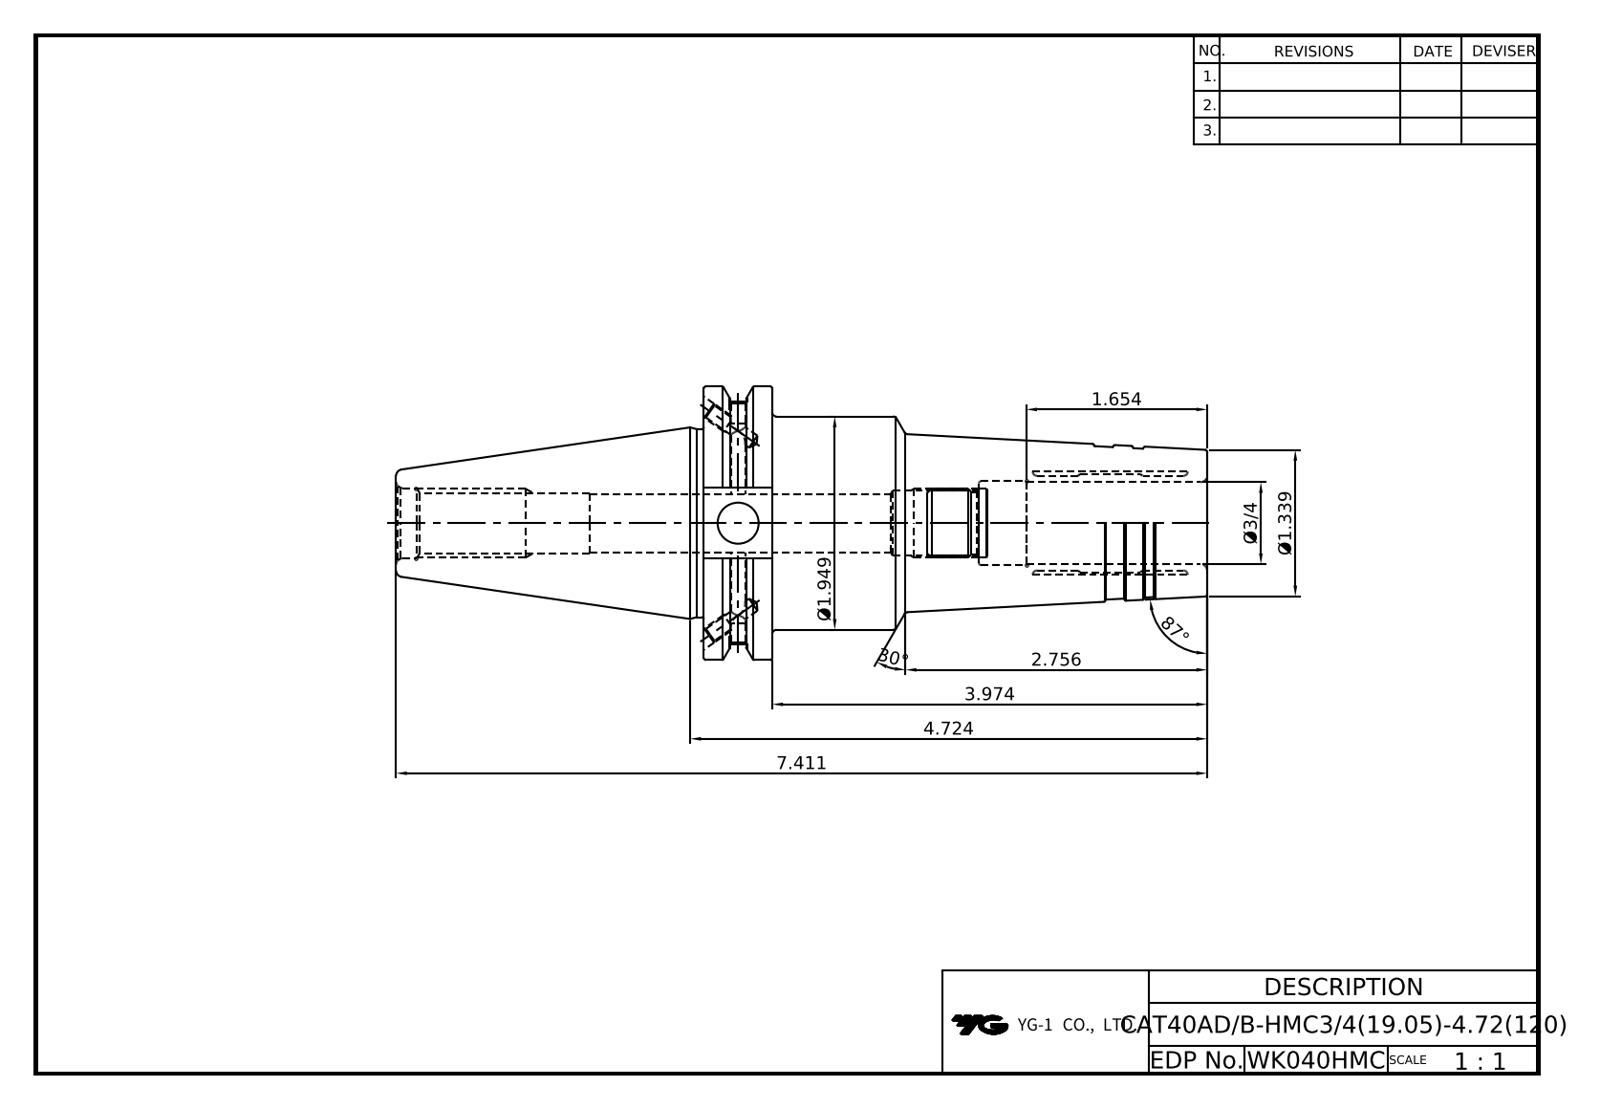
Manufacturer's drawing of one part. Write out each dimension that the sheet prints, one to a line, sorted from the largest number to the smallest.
87°
30°
7.411
4.724
3.974
2.756
Ø1.949
1.654
Ø1.339
Ø3/4
